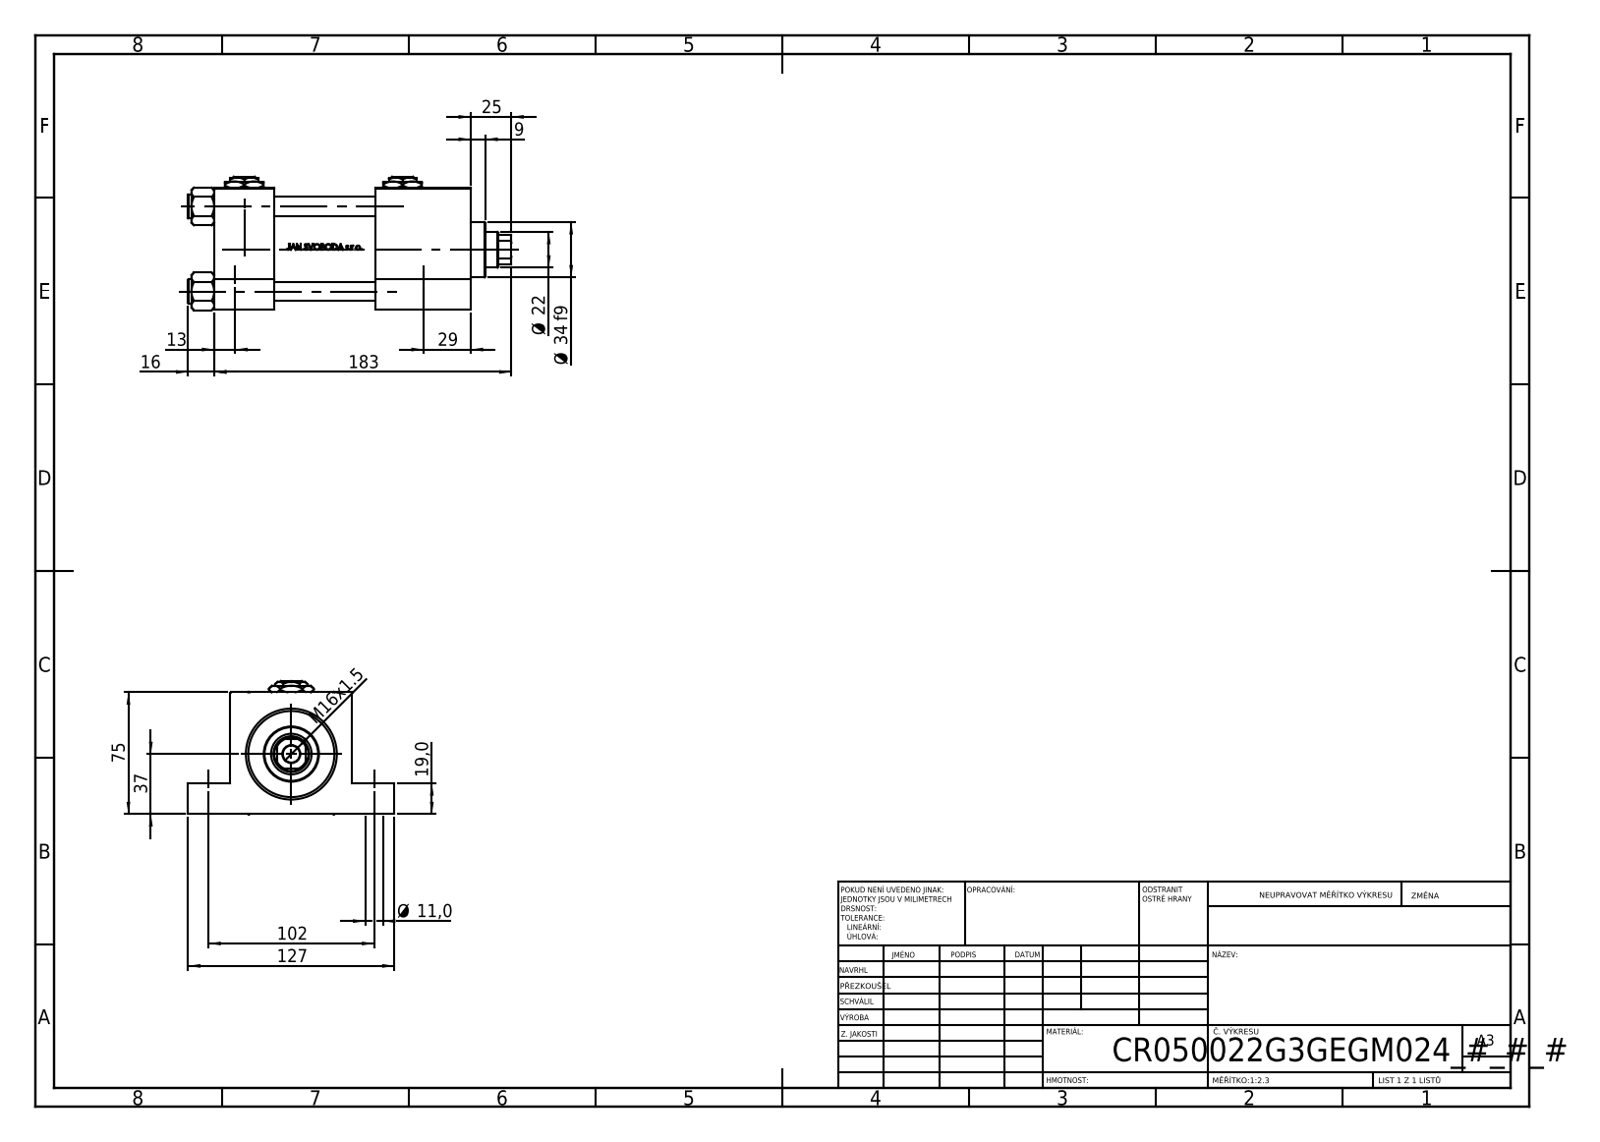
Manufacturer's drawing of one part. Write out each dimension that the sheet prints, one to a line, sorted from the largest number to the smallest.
183
127
102
75
37
Ø 34 f9
29
25
Ø 22
19,0
16
M16x1.5
13
Ø 11,0
9
